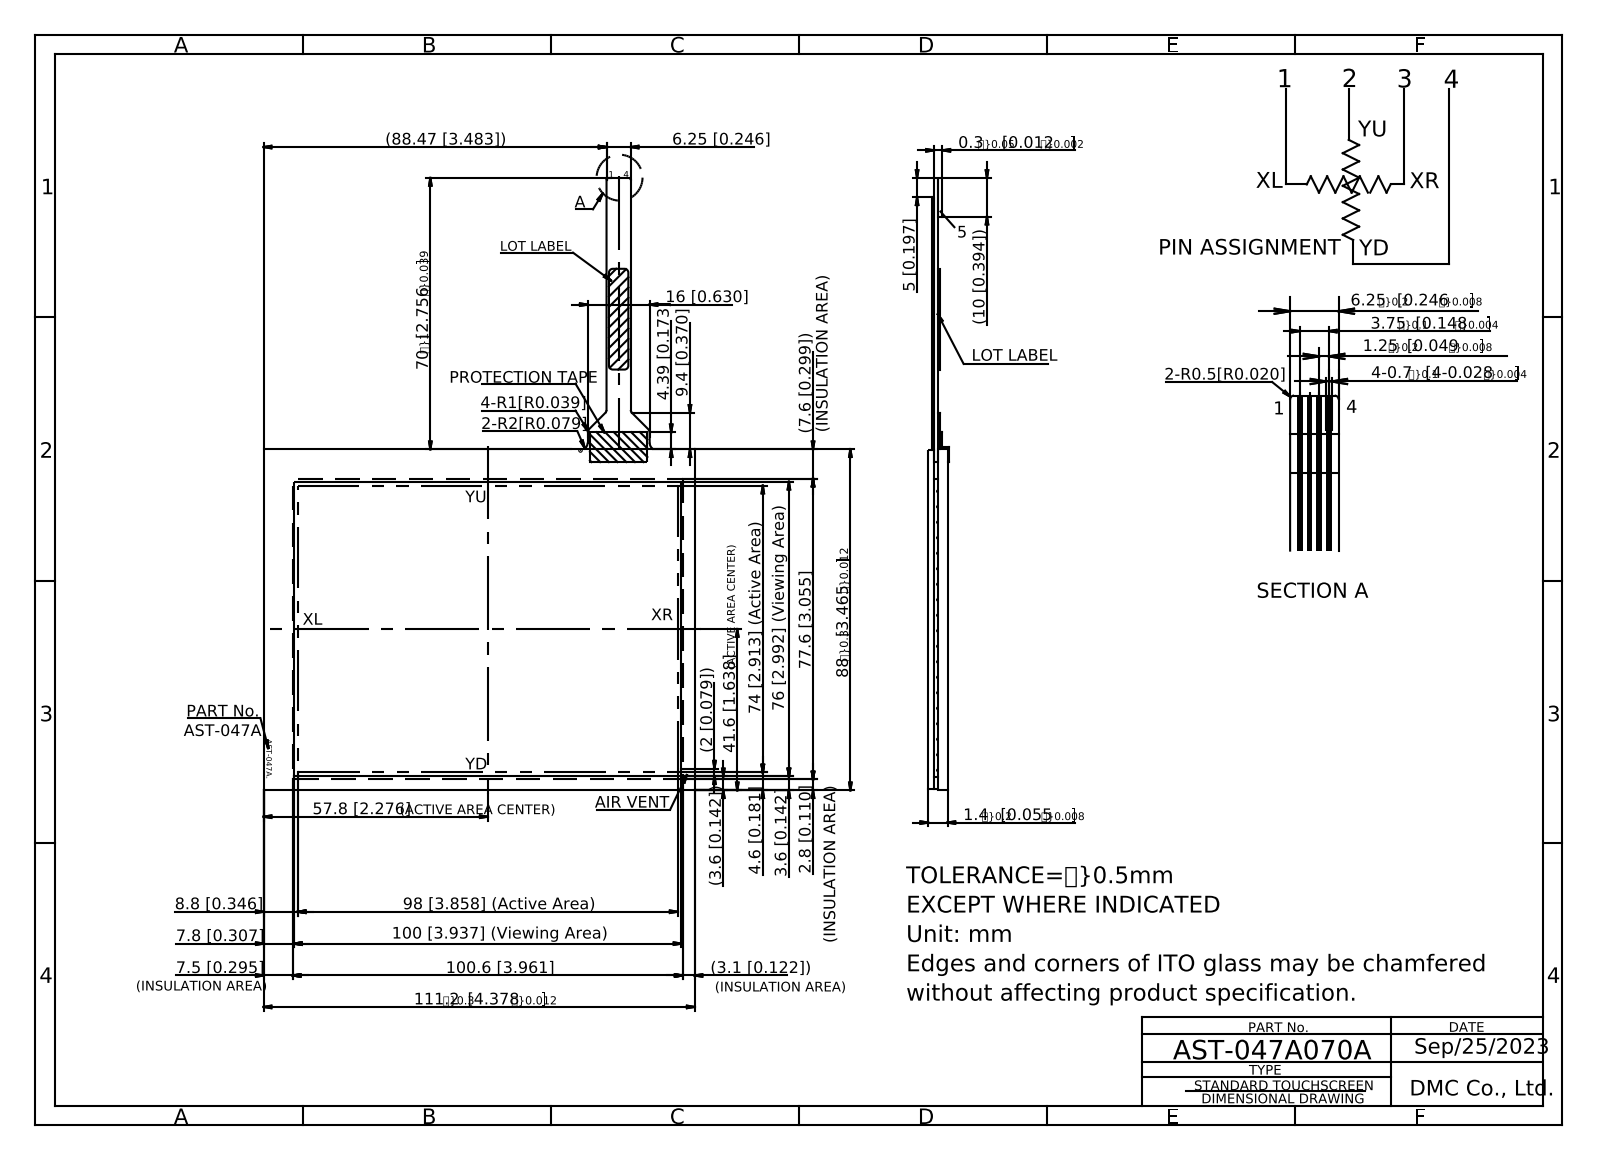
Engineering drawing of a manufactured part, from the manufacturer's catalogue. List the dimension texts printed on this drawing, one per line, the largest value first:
111.20
100.6 [3.961]
100 [3.937] (Viewing Area)
98 [3.858] (Active Area)
(88.47 [3.483])
88.00
77.6 [3.055]
76 [2.992] (Viewing Area)
74 [2.913] (Active Area)
70.00
57.80 {\H0.8333x;(ACTIVE AREA CENTER)}
41.60 {\H0.6667x;(ACTIVE AREA CENTER)}
16 [0.630]
(10 [0.394])
9.4 [0.370]
8.8 [0.346]
7.8 [0.307]
(7.6 [0.299])
7.5 [0.295]
6.25 [0.246]
5 [0.197]
4.6 [0.181]
4.39 [0.173]
3.75{\H0.66667x;?}0.1}[0.148{\H0.66667x;?}0.004}]
(3.6 [0.142])
3.6 [0.142]
(3.1 [0.122])
2.8 [0.110]
(2 [0.079])
1.4{\H0.6667x;?}0.2}[0.055{\H0.66667x;?}0.008}]
0.3{\H0.6667x;?}0.05}[0.012{\H0.6667x;?}0.002}]
